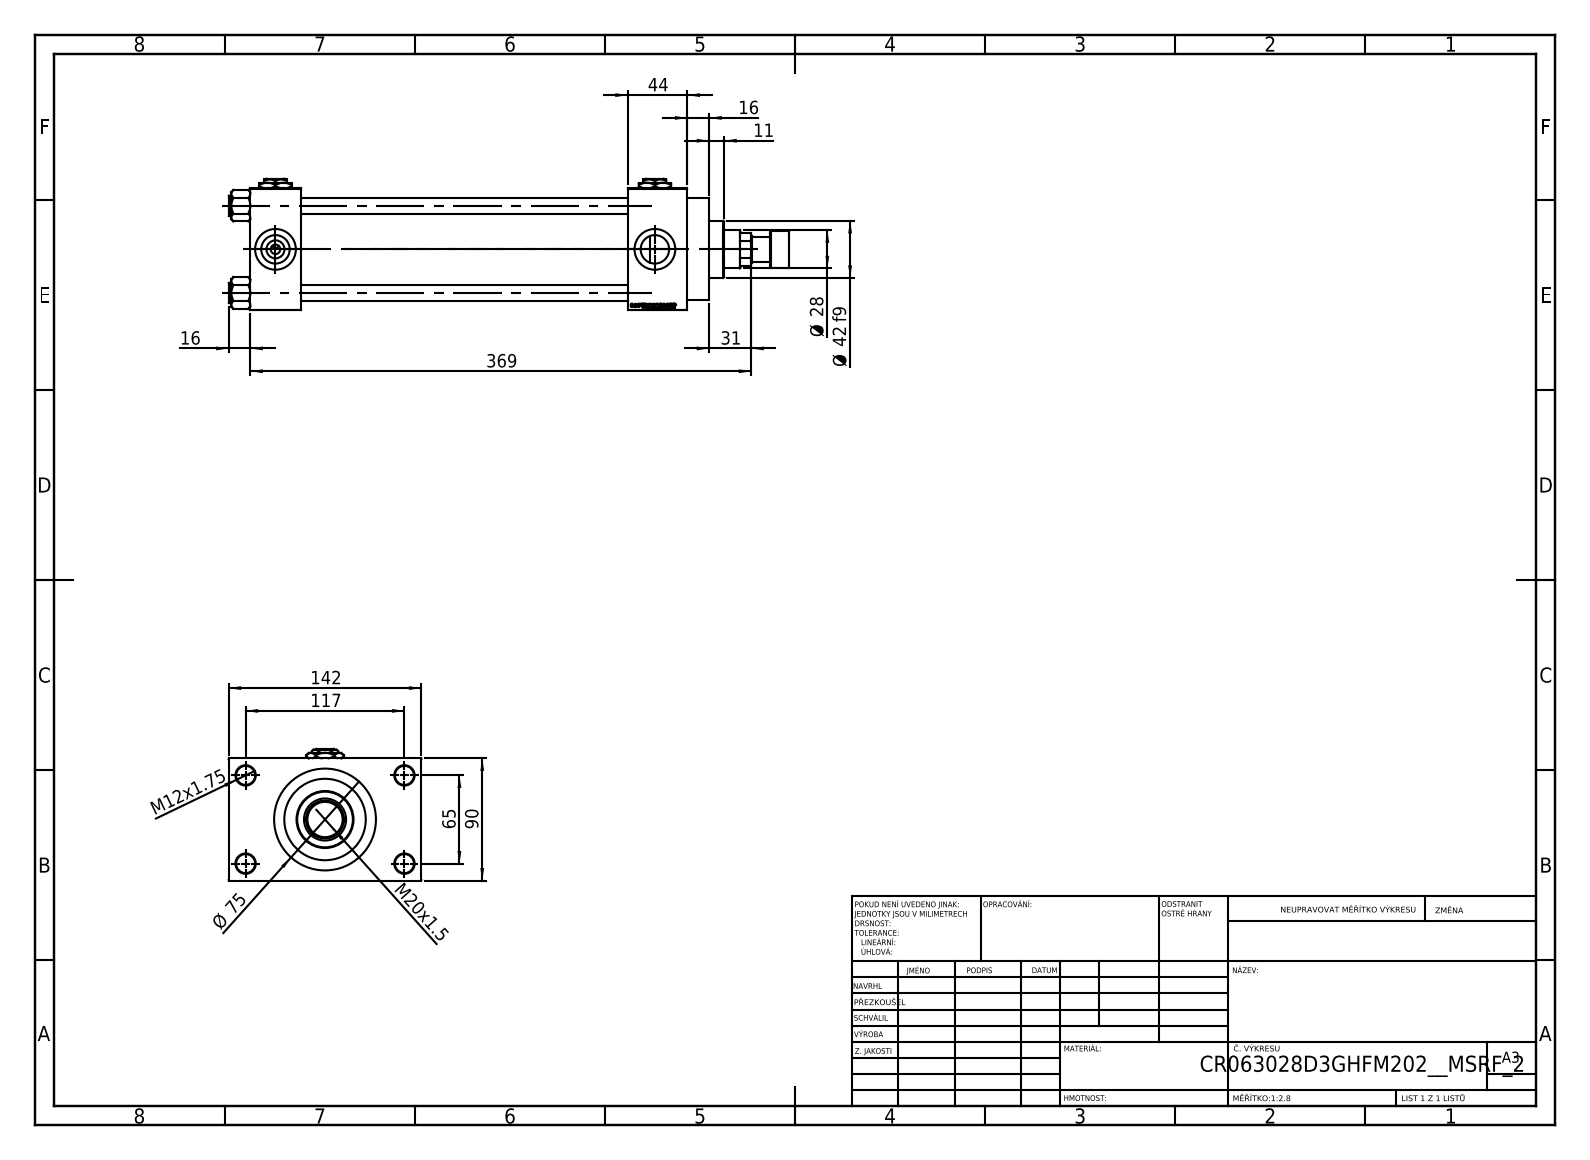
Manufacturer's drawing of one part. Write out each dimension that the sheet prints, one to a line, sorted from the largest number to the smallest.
369
142
117
90
Ø 75
65
44
Ø 42 f9
31
Ø 28
M20x1.5
16
16
M12x1.75
11
